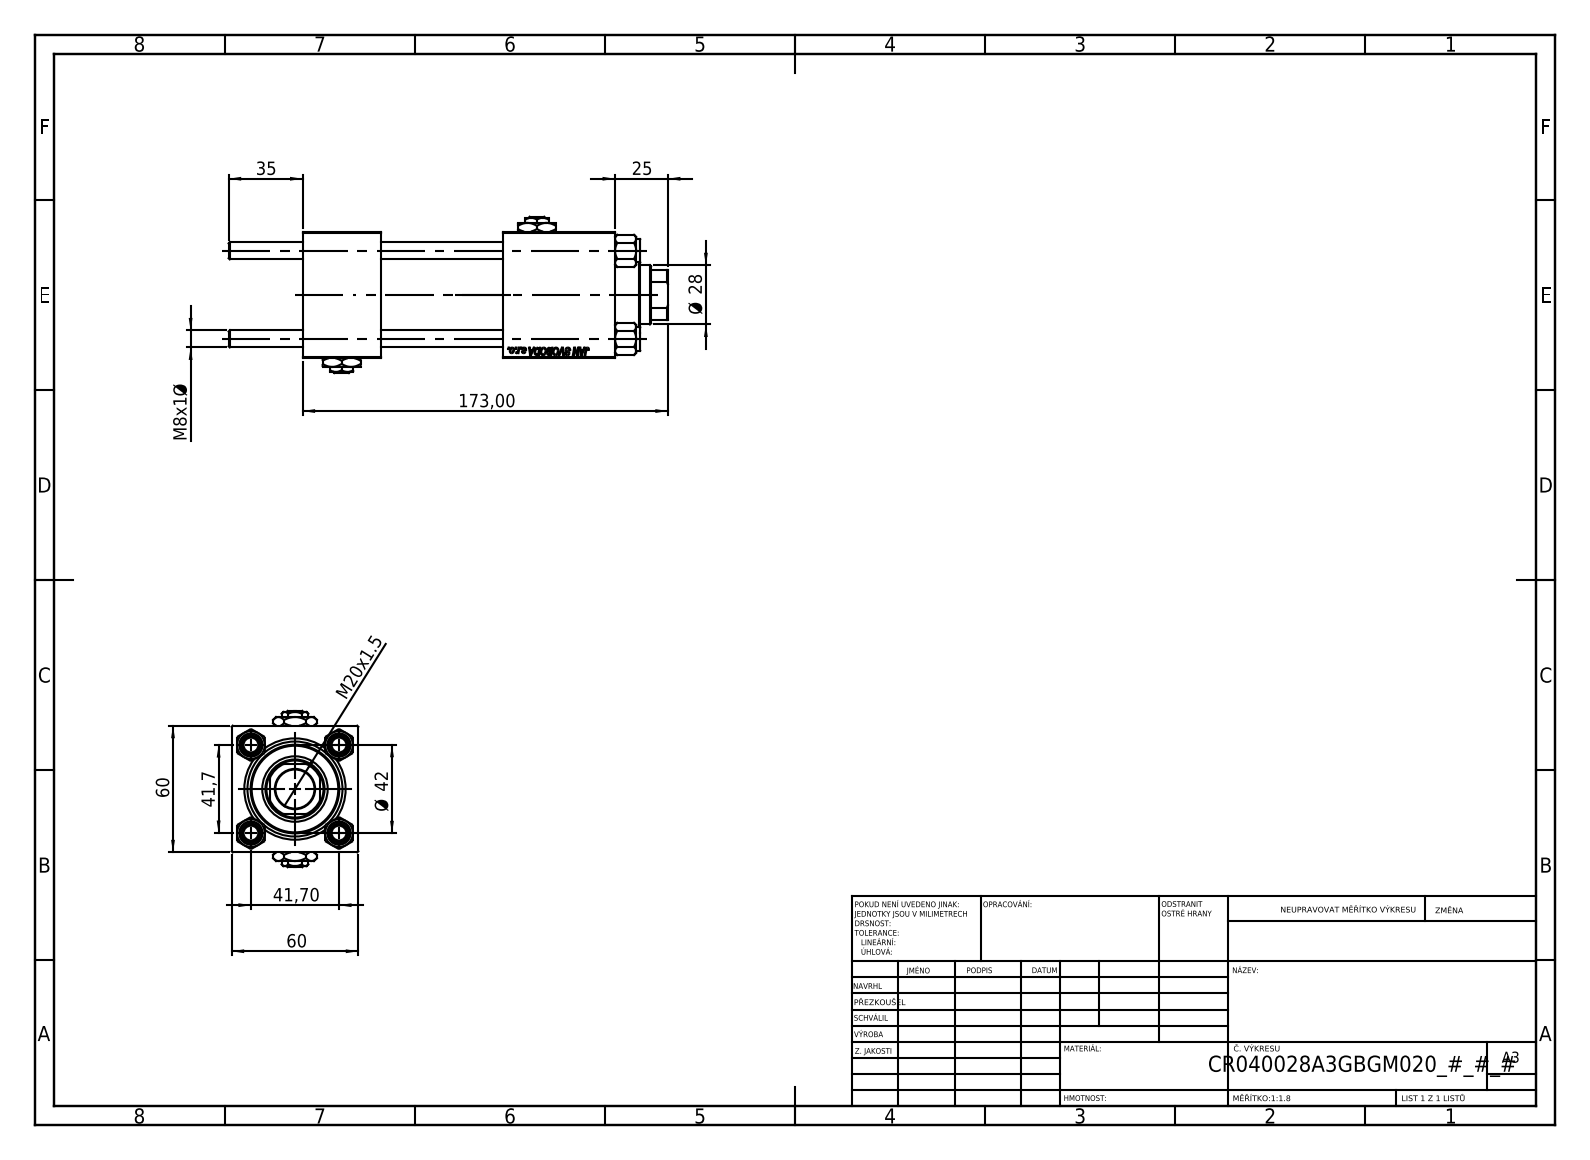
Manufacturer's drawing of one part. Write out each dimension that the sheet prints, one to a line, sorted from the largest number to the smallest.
173,00
60
60
Ø 42
41,7
41,70
35
Ø 28
25
M20x1.5
M8x1 Ø
